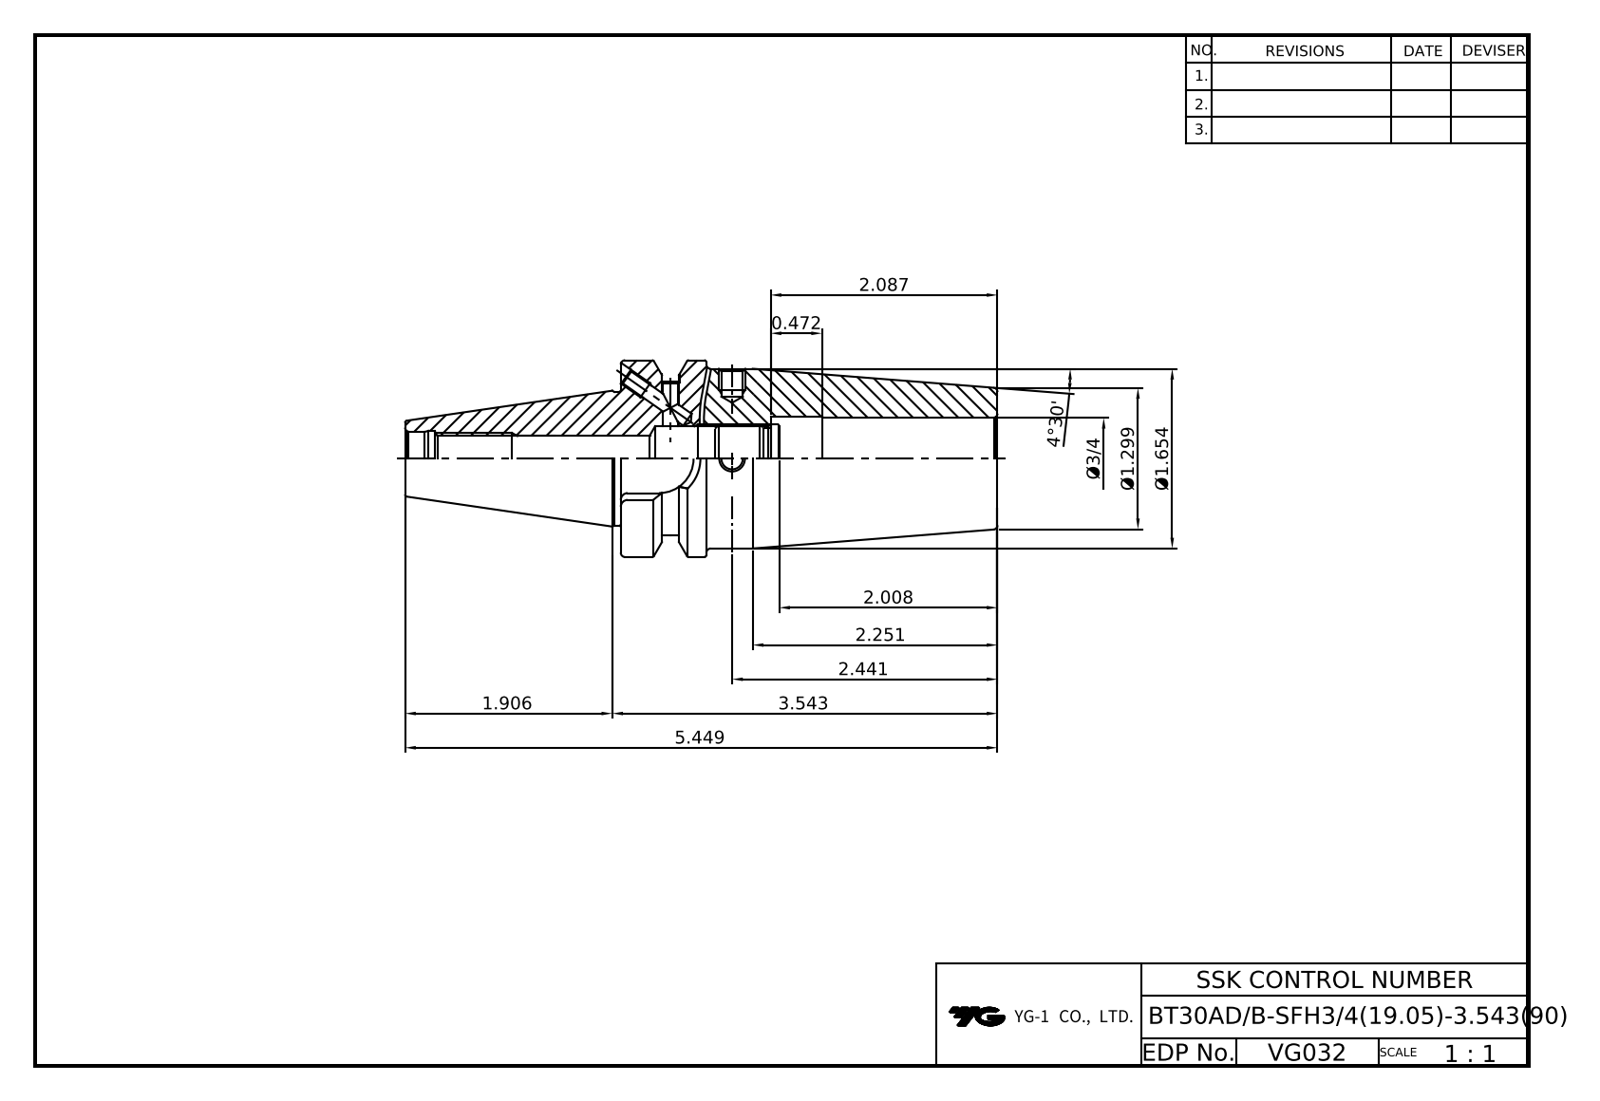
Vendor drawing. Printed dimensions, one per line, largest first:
5.449
4°30'
3.543
2.441
2.251
2.087
2.008
1.906
Ø1.654
Ø1.299
0.472
